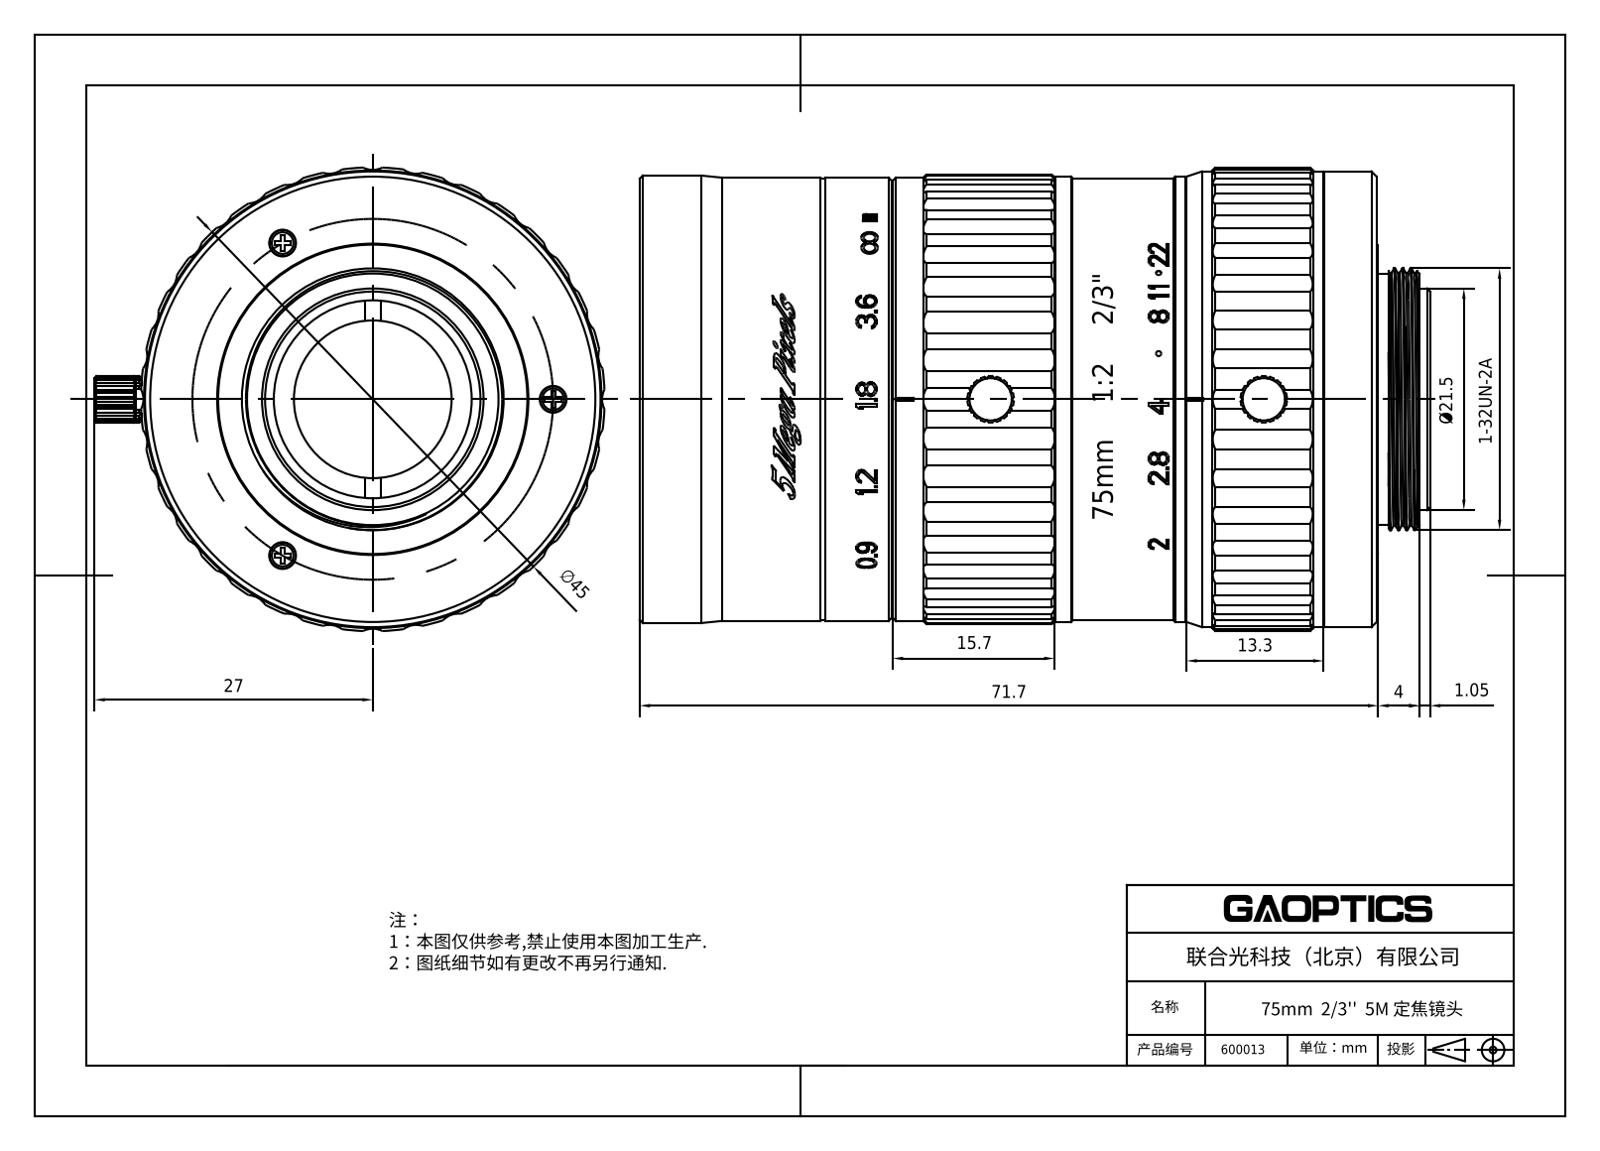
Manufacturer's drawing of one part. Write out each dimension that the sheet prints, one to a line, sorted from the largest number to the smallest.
71.7
∅45
27
Ø21.5
15.7
13.3
4
1.05
1-32UN-2A
